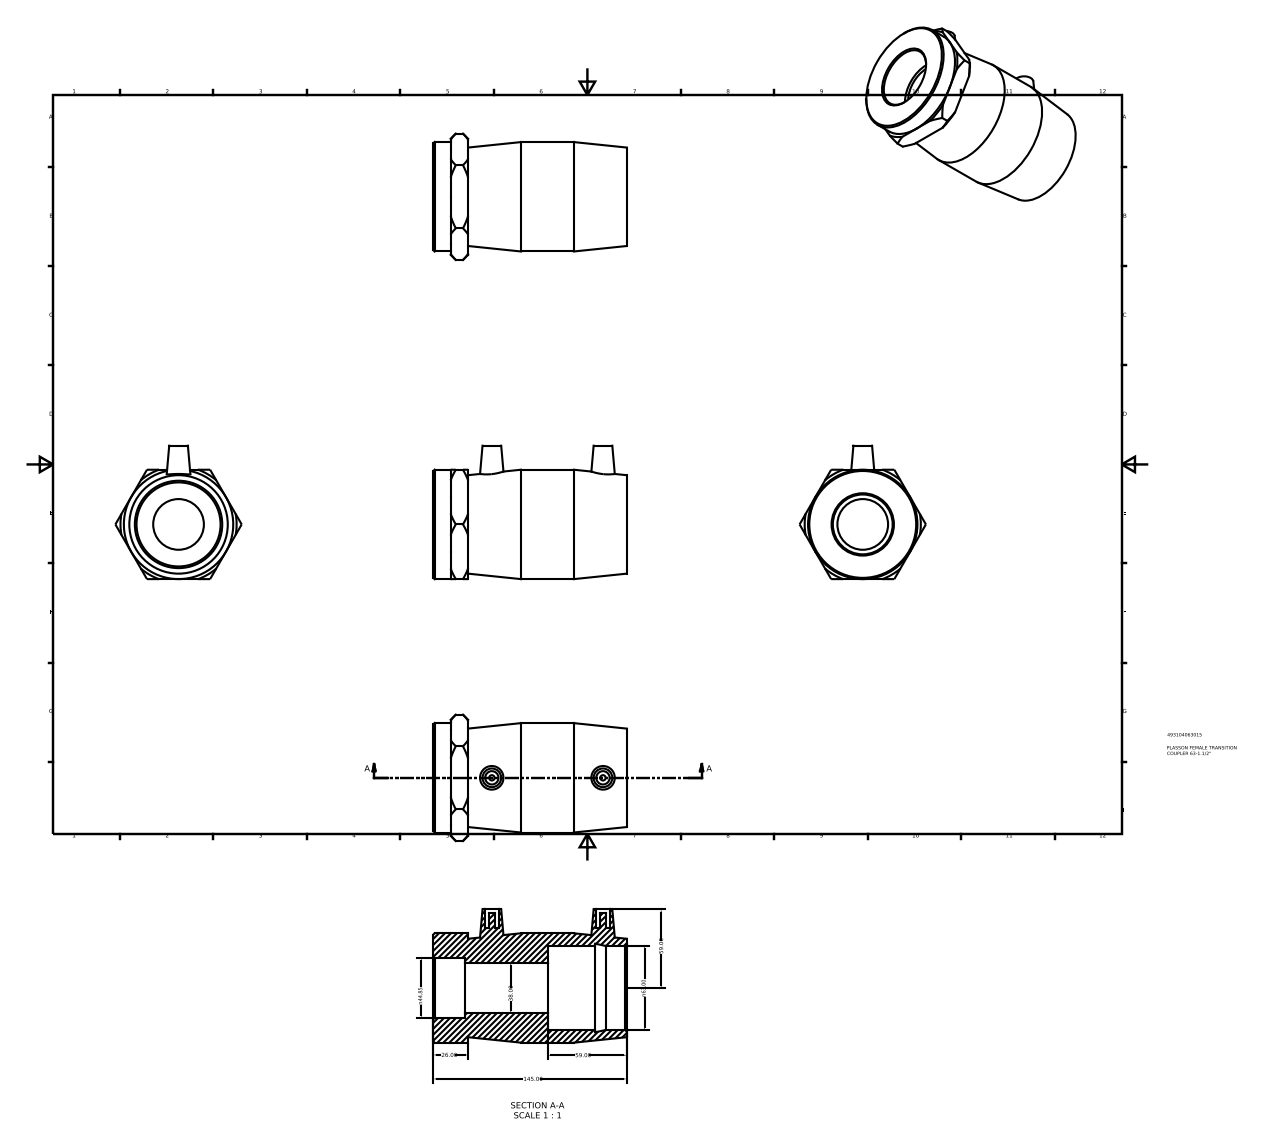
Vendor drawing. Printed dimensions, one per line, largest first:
145.00
n63.00
59.00
59.00
n44.85
38.00
26.00
